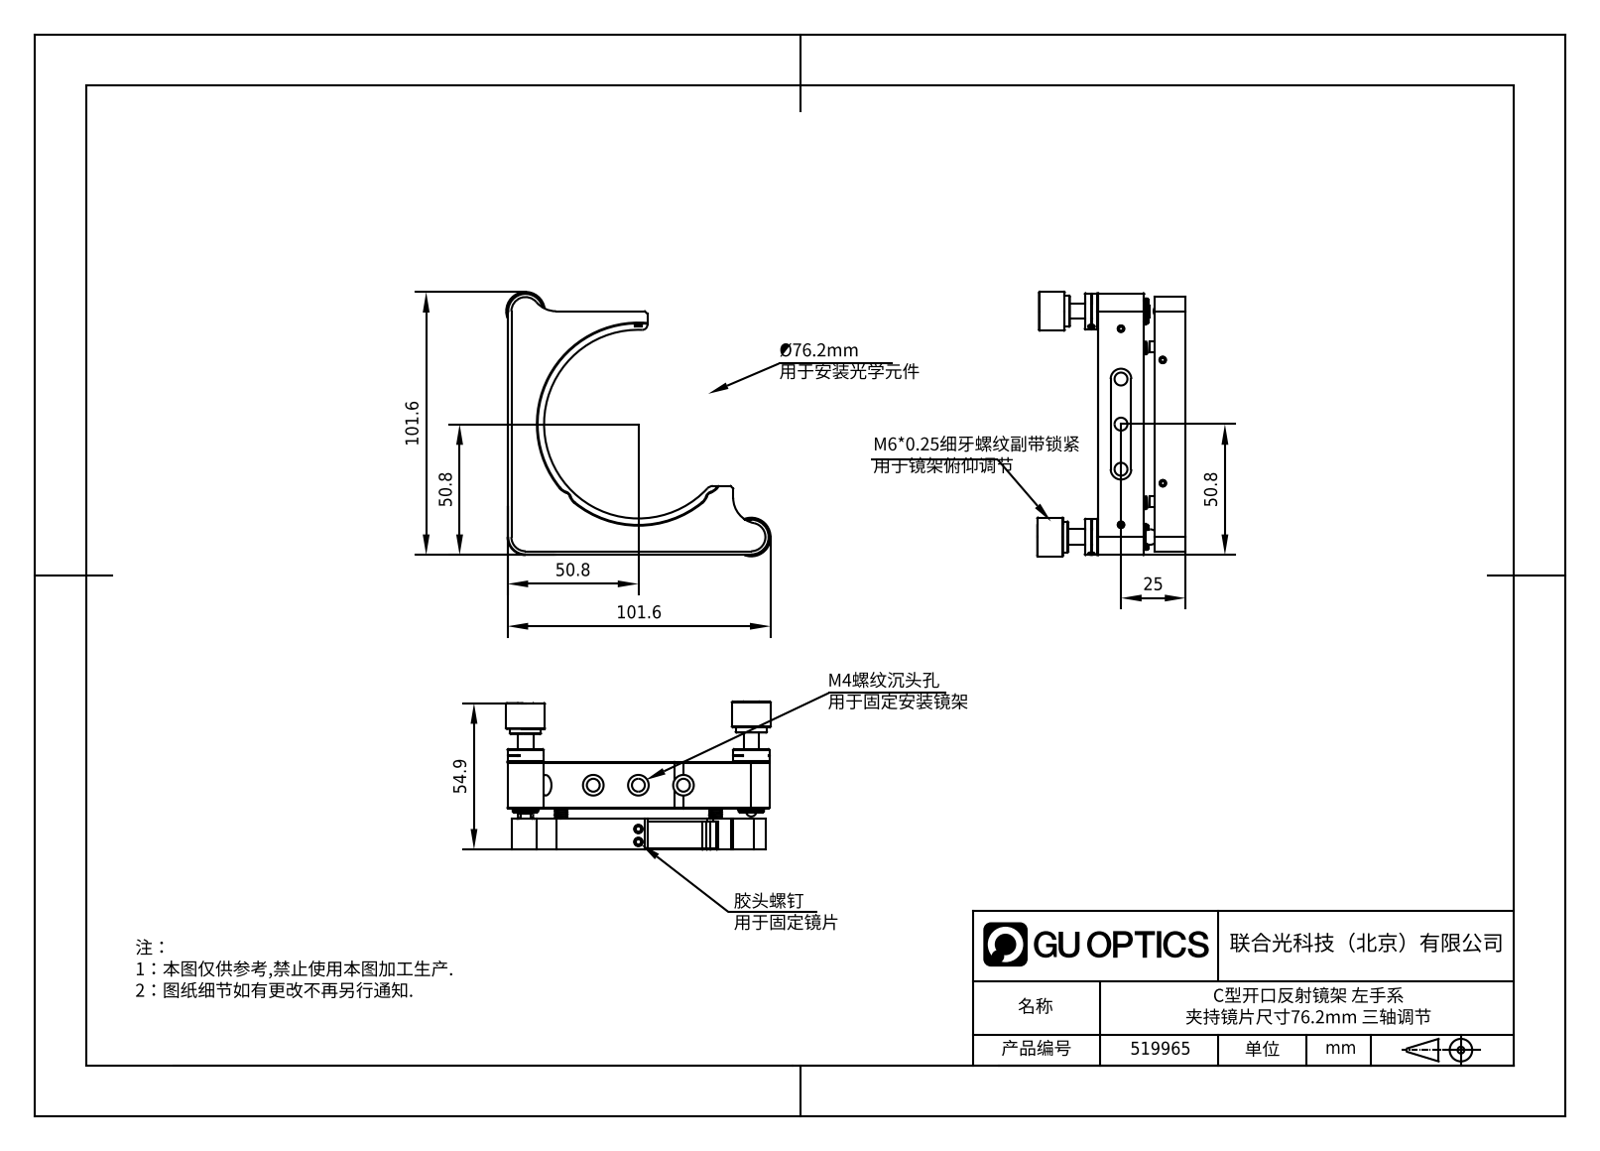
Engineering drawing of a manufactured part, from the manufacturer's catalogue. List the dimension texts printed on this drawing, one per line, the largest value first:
101.6
101.6
54.9
50.8
50.8
50.8
25
